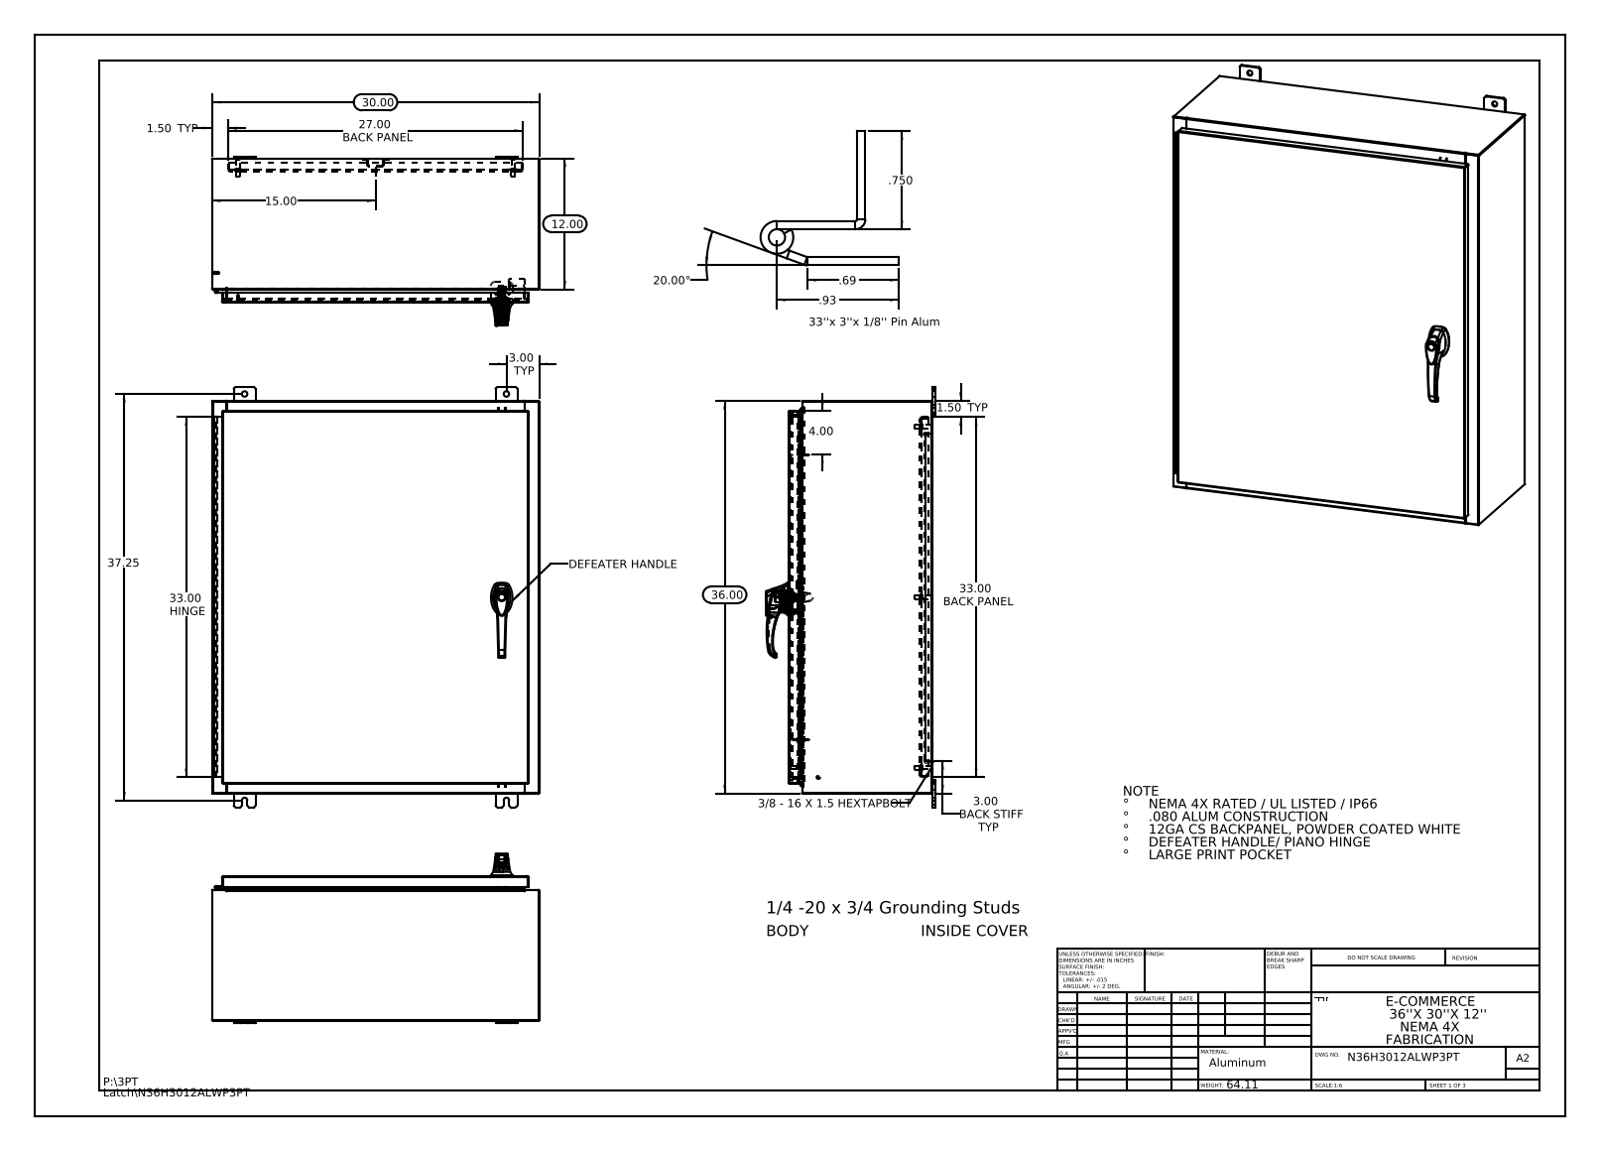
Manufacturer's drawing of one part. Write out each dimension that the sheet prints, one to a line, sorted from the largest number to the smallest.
37.25
36.00
33.00 HINGE
33.00 BACK PANEL
30.00
27.00 BACK PANEL
20.00°
15.00
12.00
4.00
3.00 TYP
3.00 BACK STIFF TYP
1.50 TYP
1.50 TYP
.93
.750
.69
